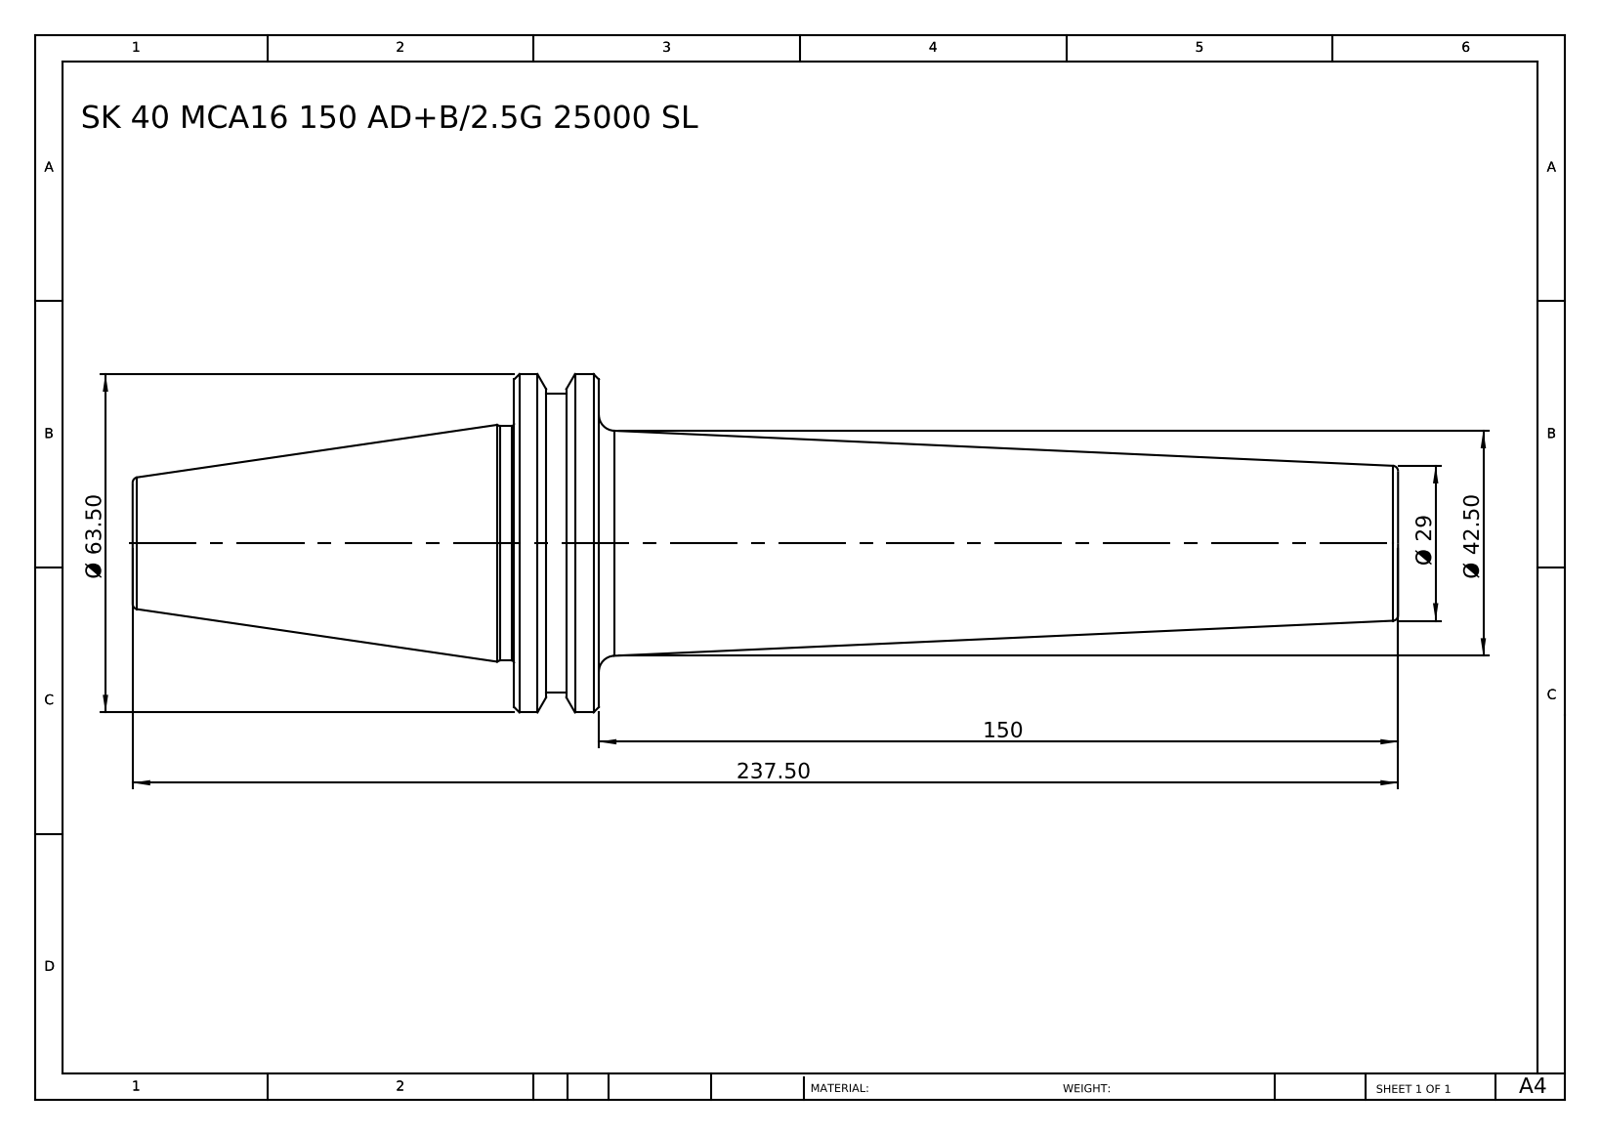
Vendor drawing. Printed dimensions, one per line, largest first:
237.50
150
Ø 63.50
Ø 42.50
Ø 29
